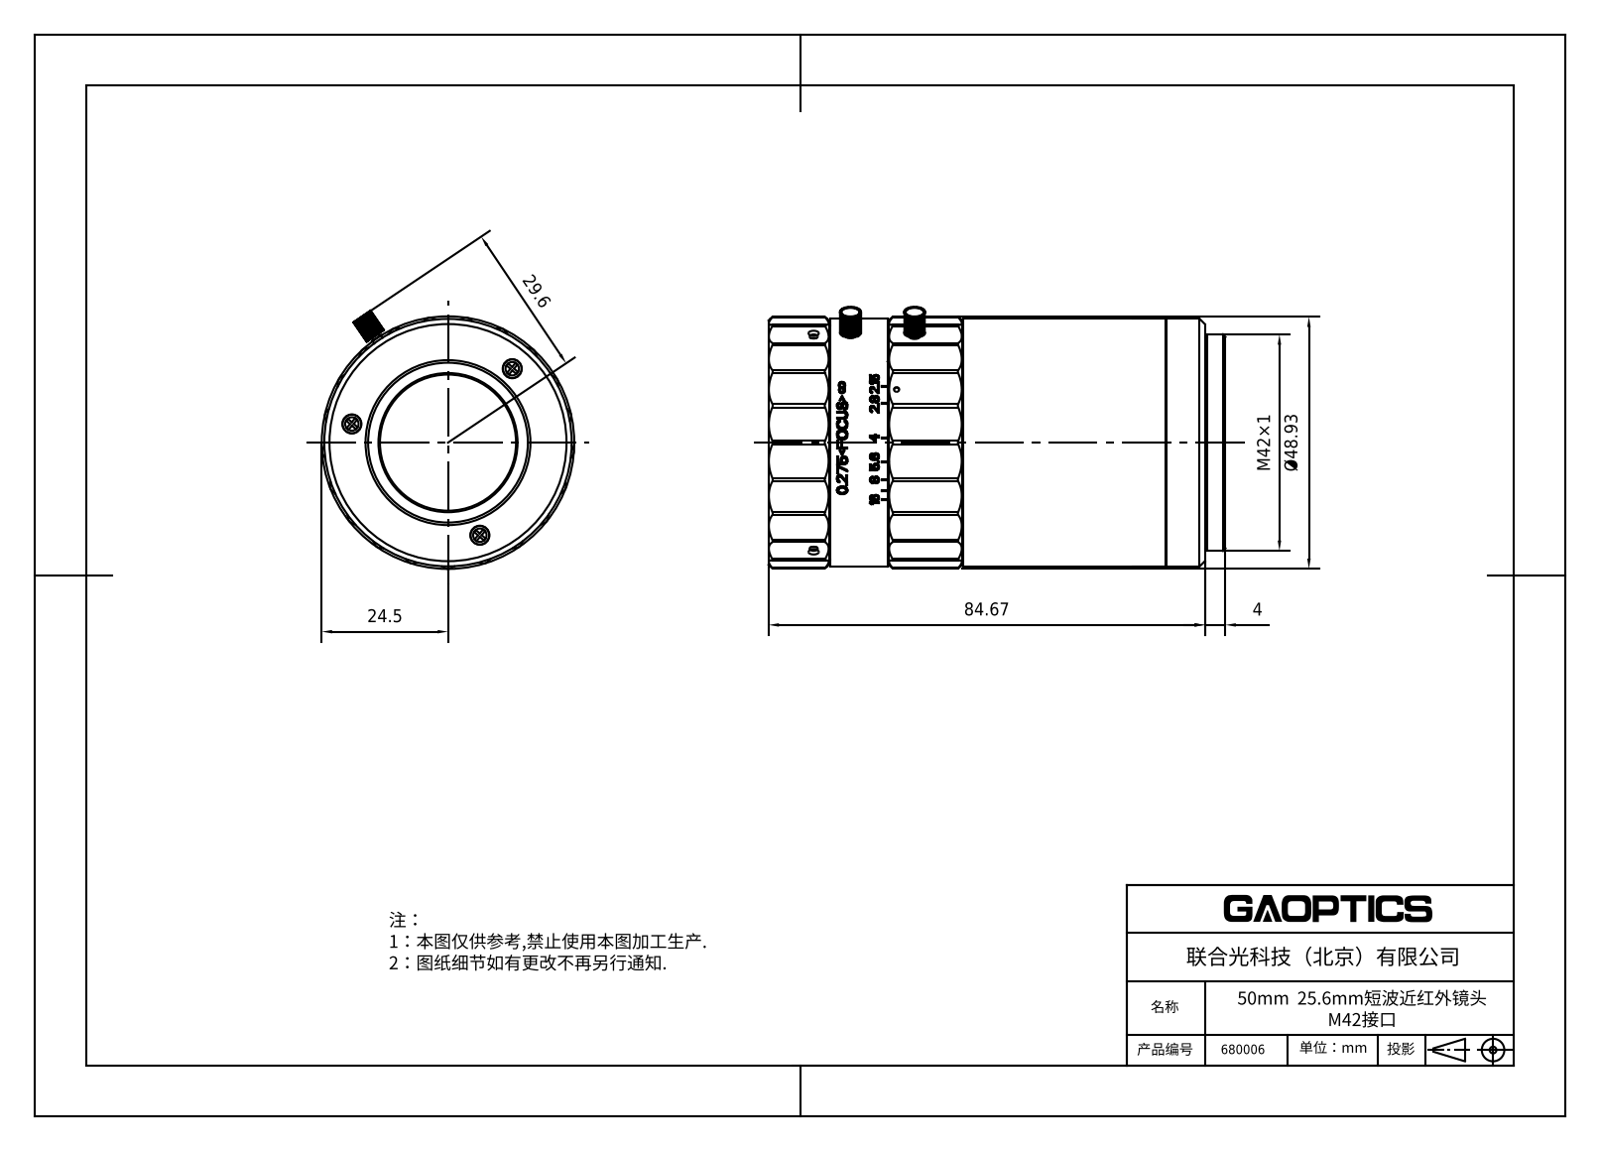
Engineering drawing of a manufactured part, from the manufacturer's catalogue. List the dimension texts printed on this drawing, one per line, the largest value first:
84.67
Ø48.93
M42×1
29.6
24.5
4
